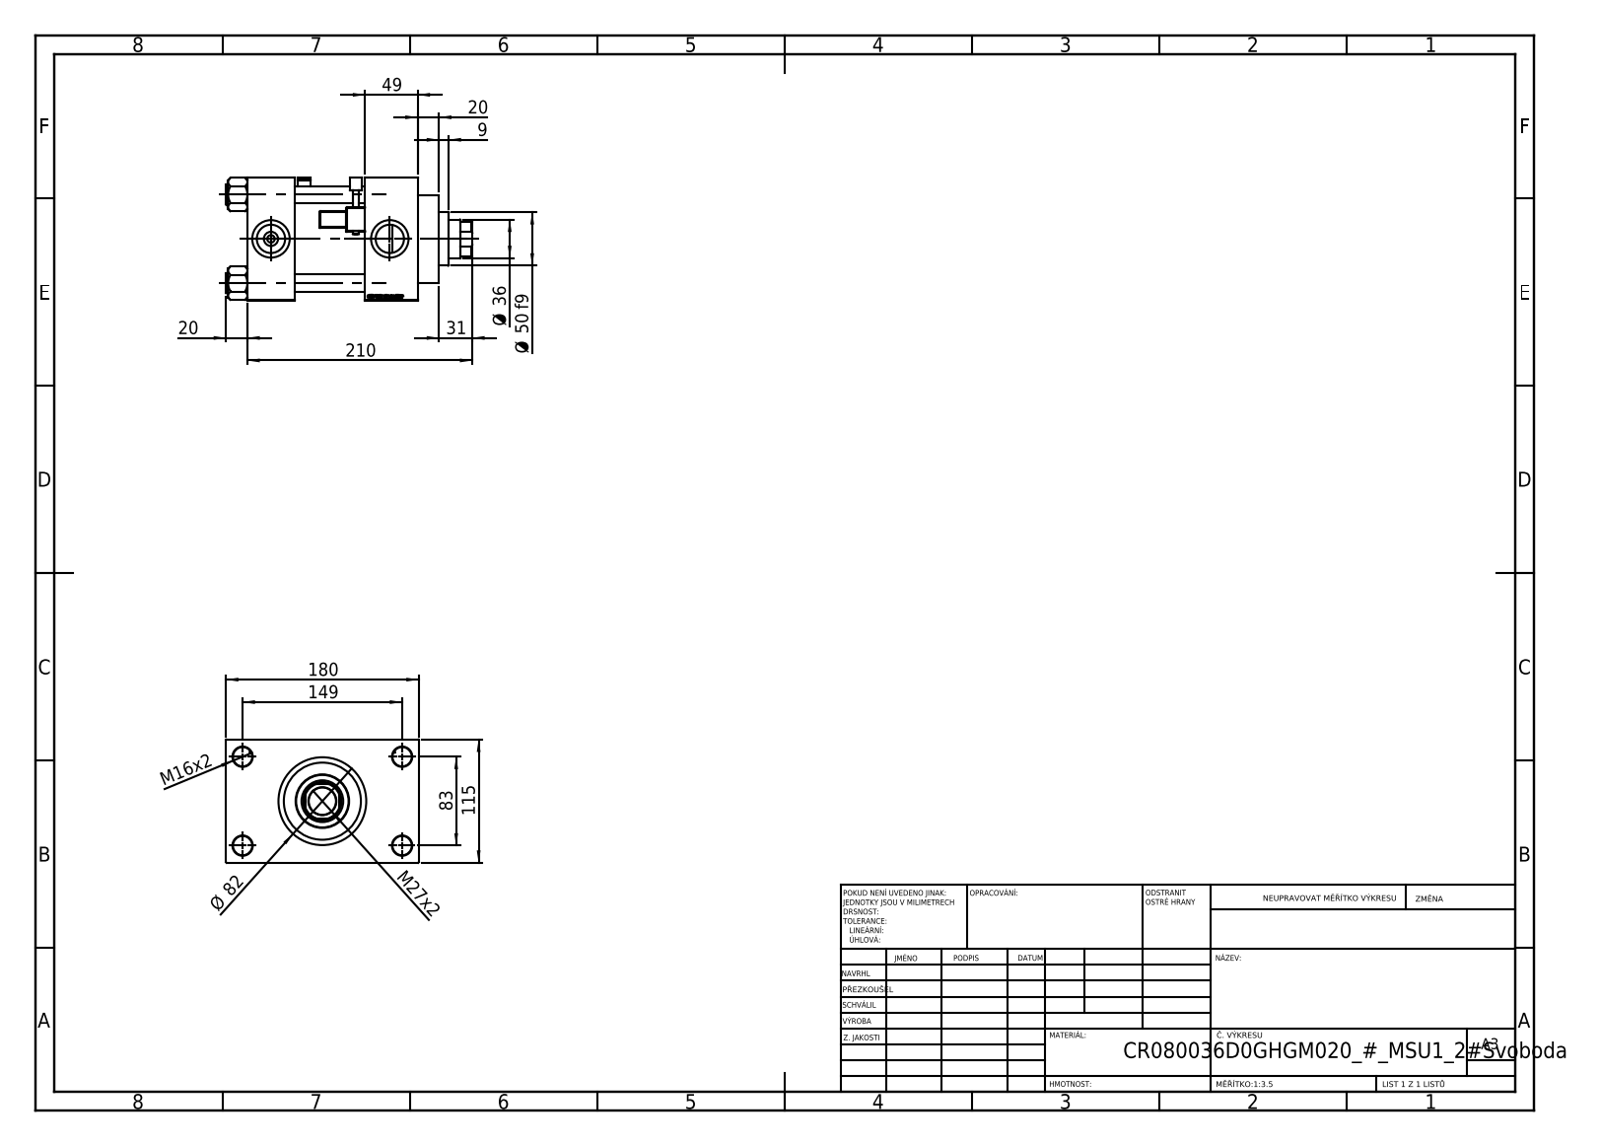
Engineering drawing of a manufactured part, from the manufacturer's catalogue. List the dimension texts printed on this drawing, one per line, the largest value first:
210
180
149
115
83
Ø 82
Ø 50 f9
49
Ø 36
31
M27x2
20
20
M16x2
9
